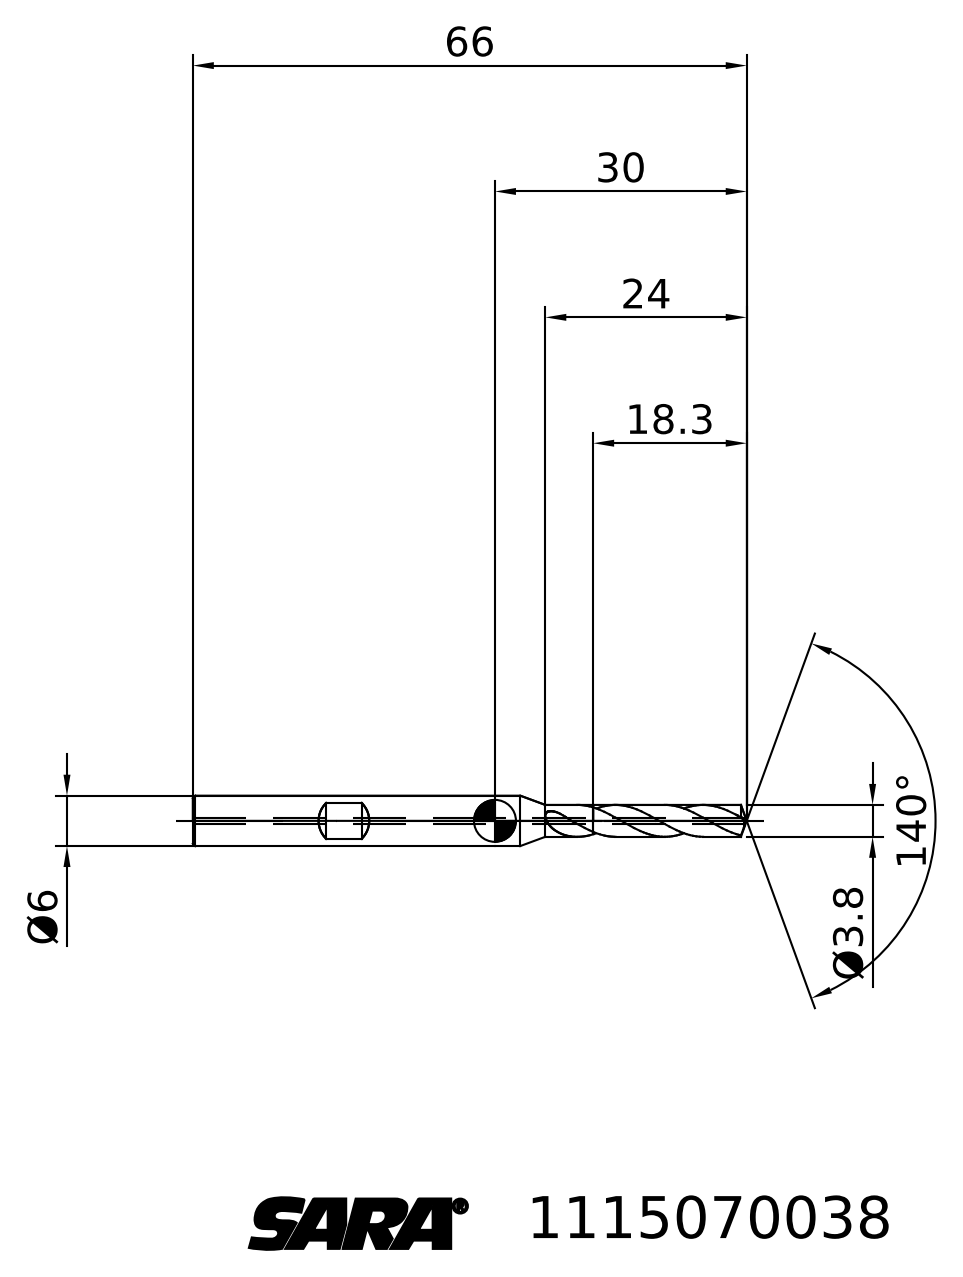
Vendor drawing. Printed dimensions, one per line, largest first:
140°
66
30
24
18.3
Ø6
Ø3.8
